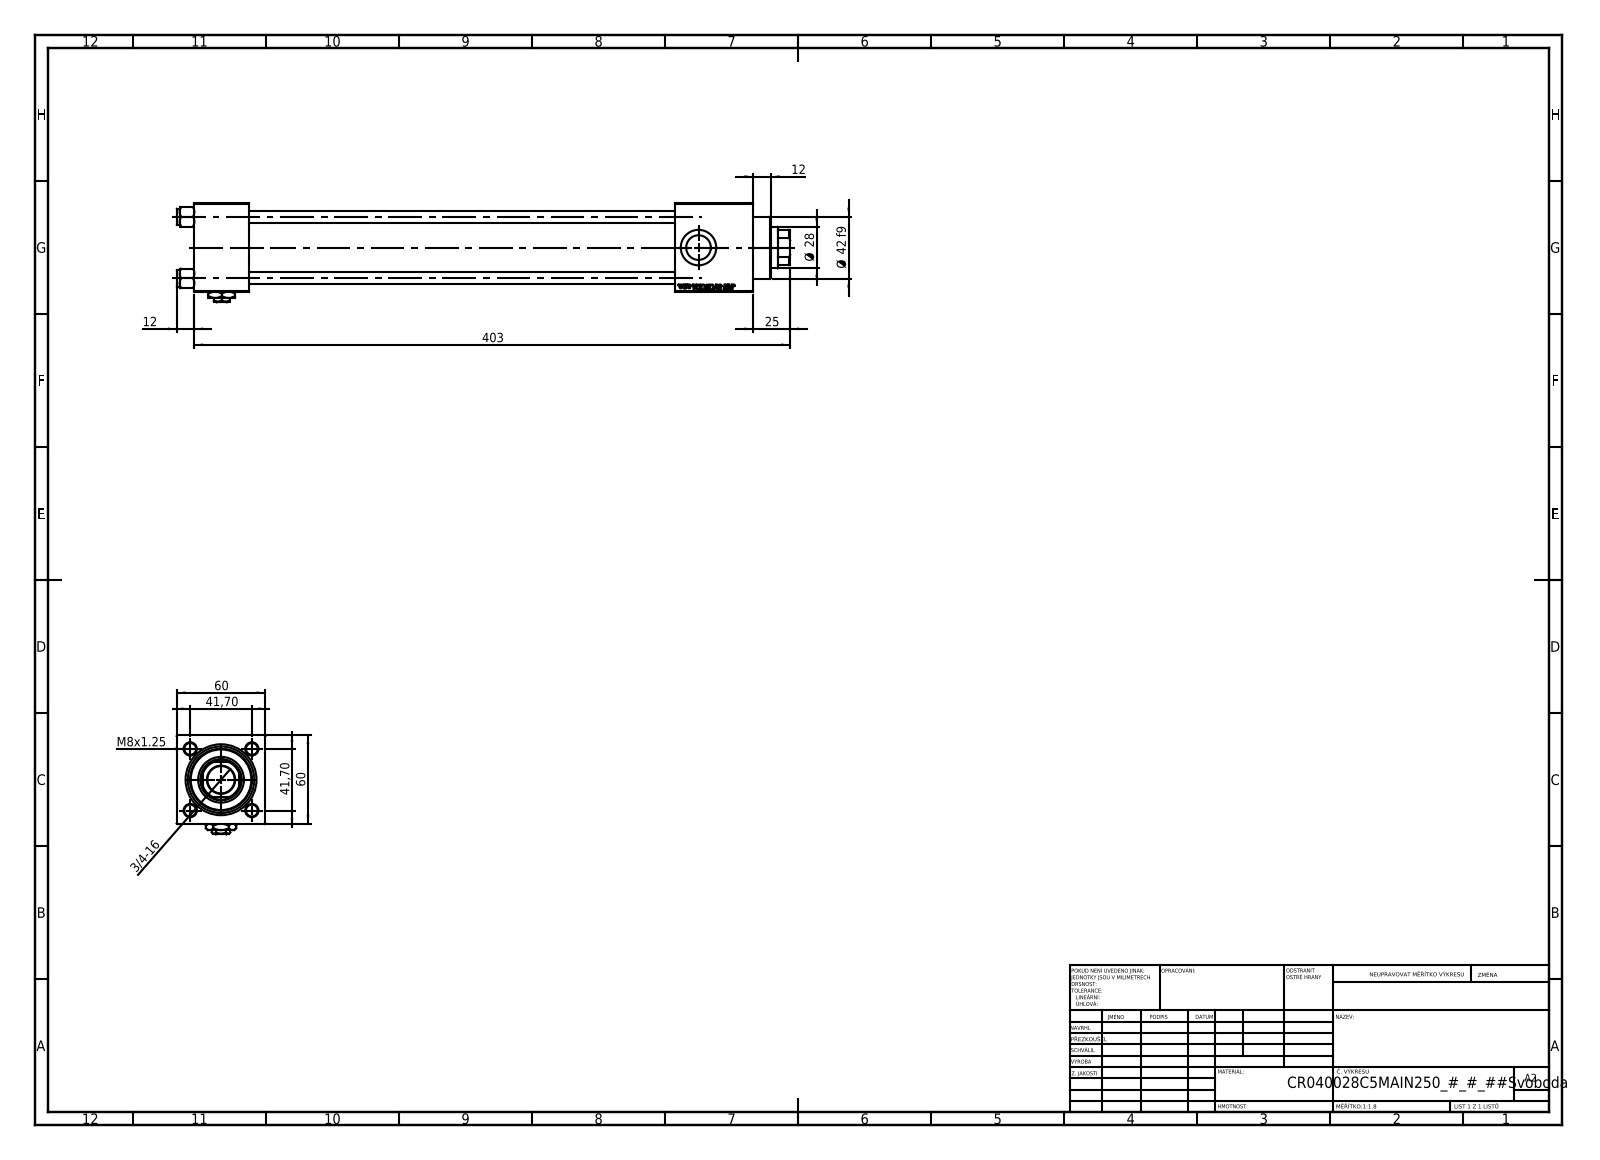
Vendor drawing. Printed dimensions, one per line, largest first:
403
60
60
Ø 42 f9
41,70
41,70
Ø 28
25
12
12
M8x1.25
3/4-16
